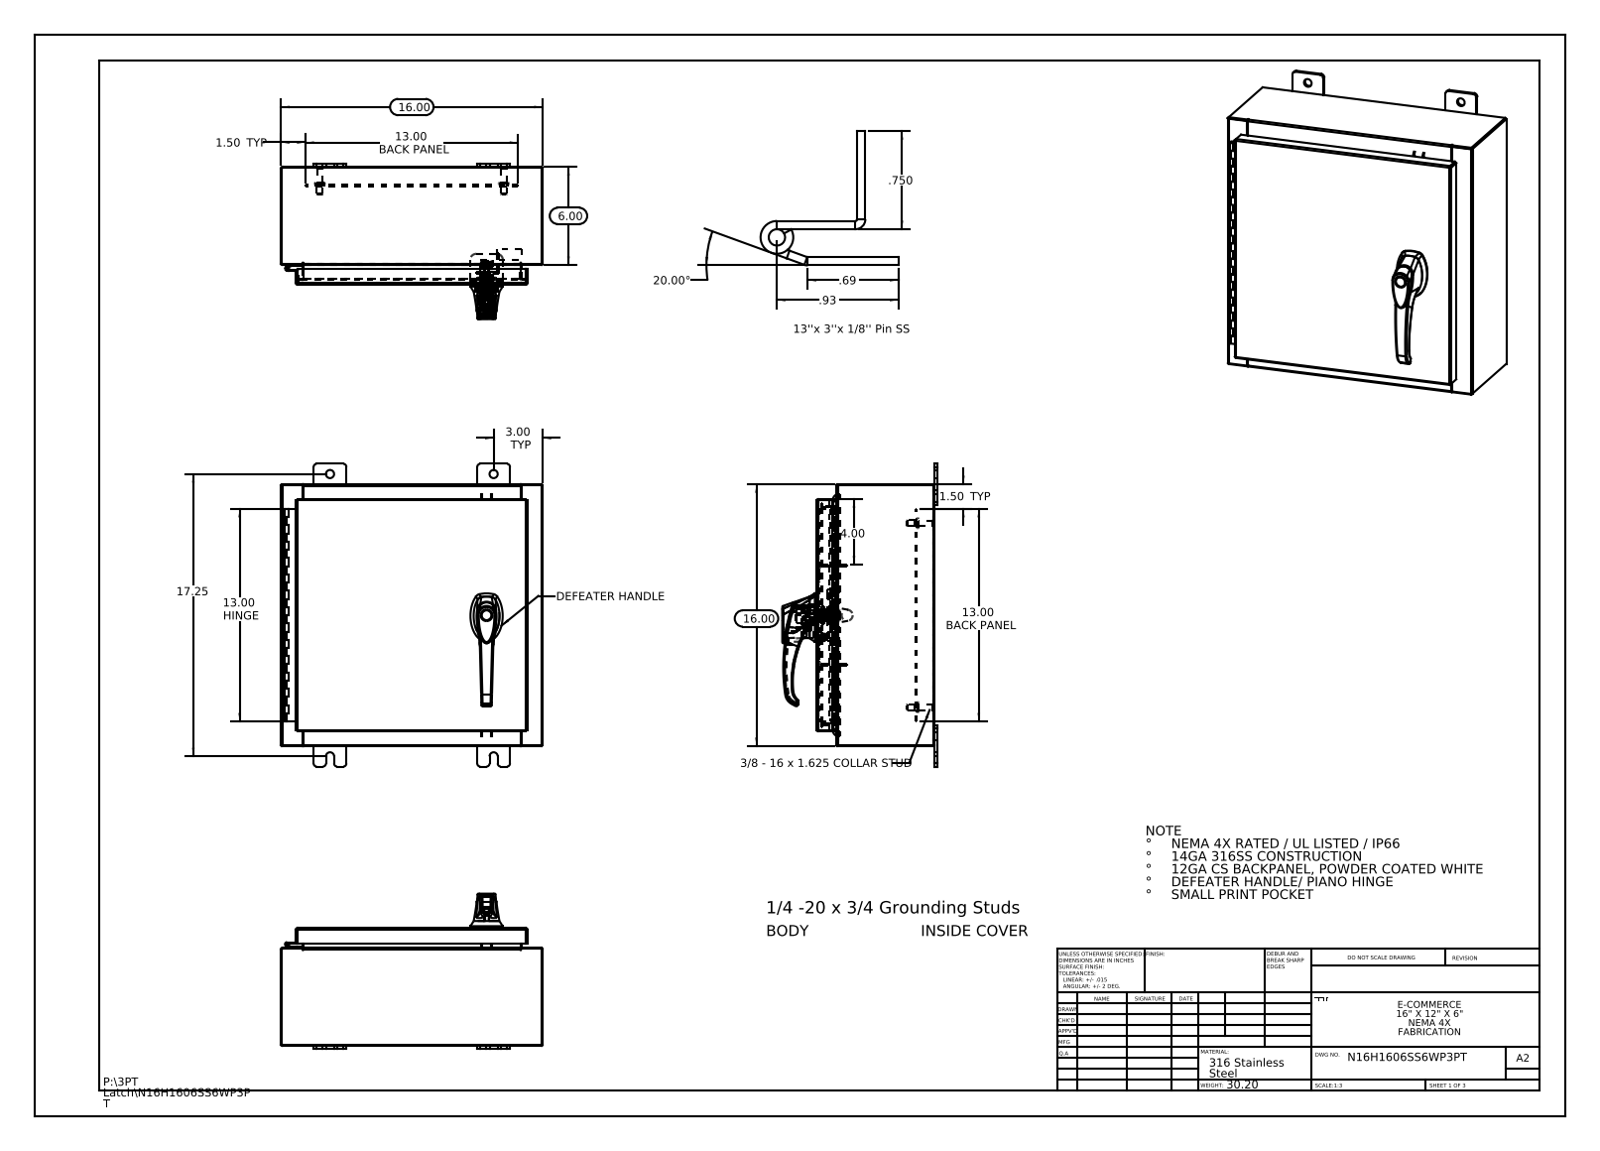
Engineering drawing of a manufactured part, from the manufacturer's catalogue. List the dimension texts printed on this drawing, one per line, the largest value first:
20.00°
17.25
16.00
16.00
13.00 HINGE
13.00 BACK PANEL
13.00 BACK PANEL
6.00
4.00
3.00 TYP
1.50 TYP
1.50 TYP
.93
.750
.69
